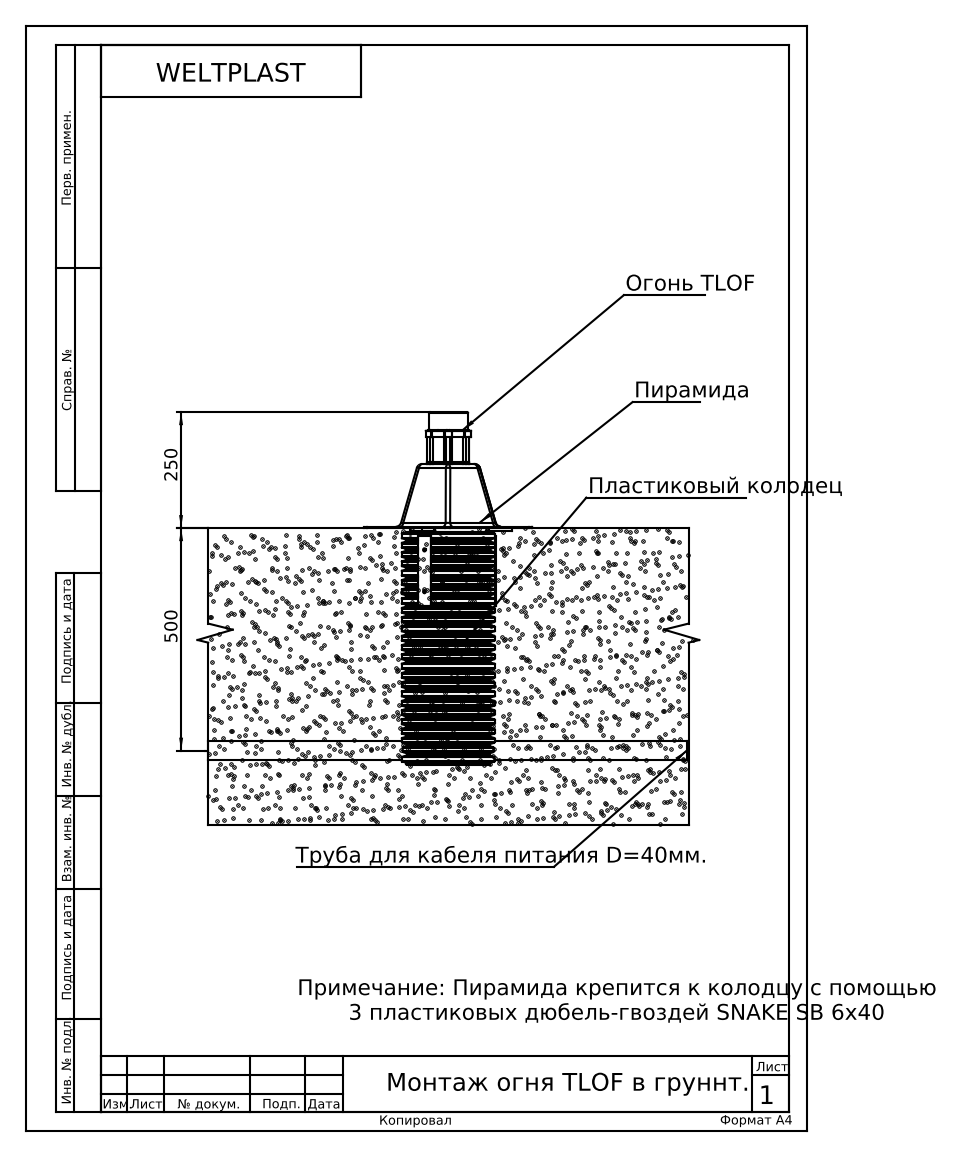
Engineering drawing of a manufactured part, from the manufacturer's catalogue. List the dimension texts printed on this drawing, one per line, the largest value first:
500
250
